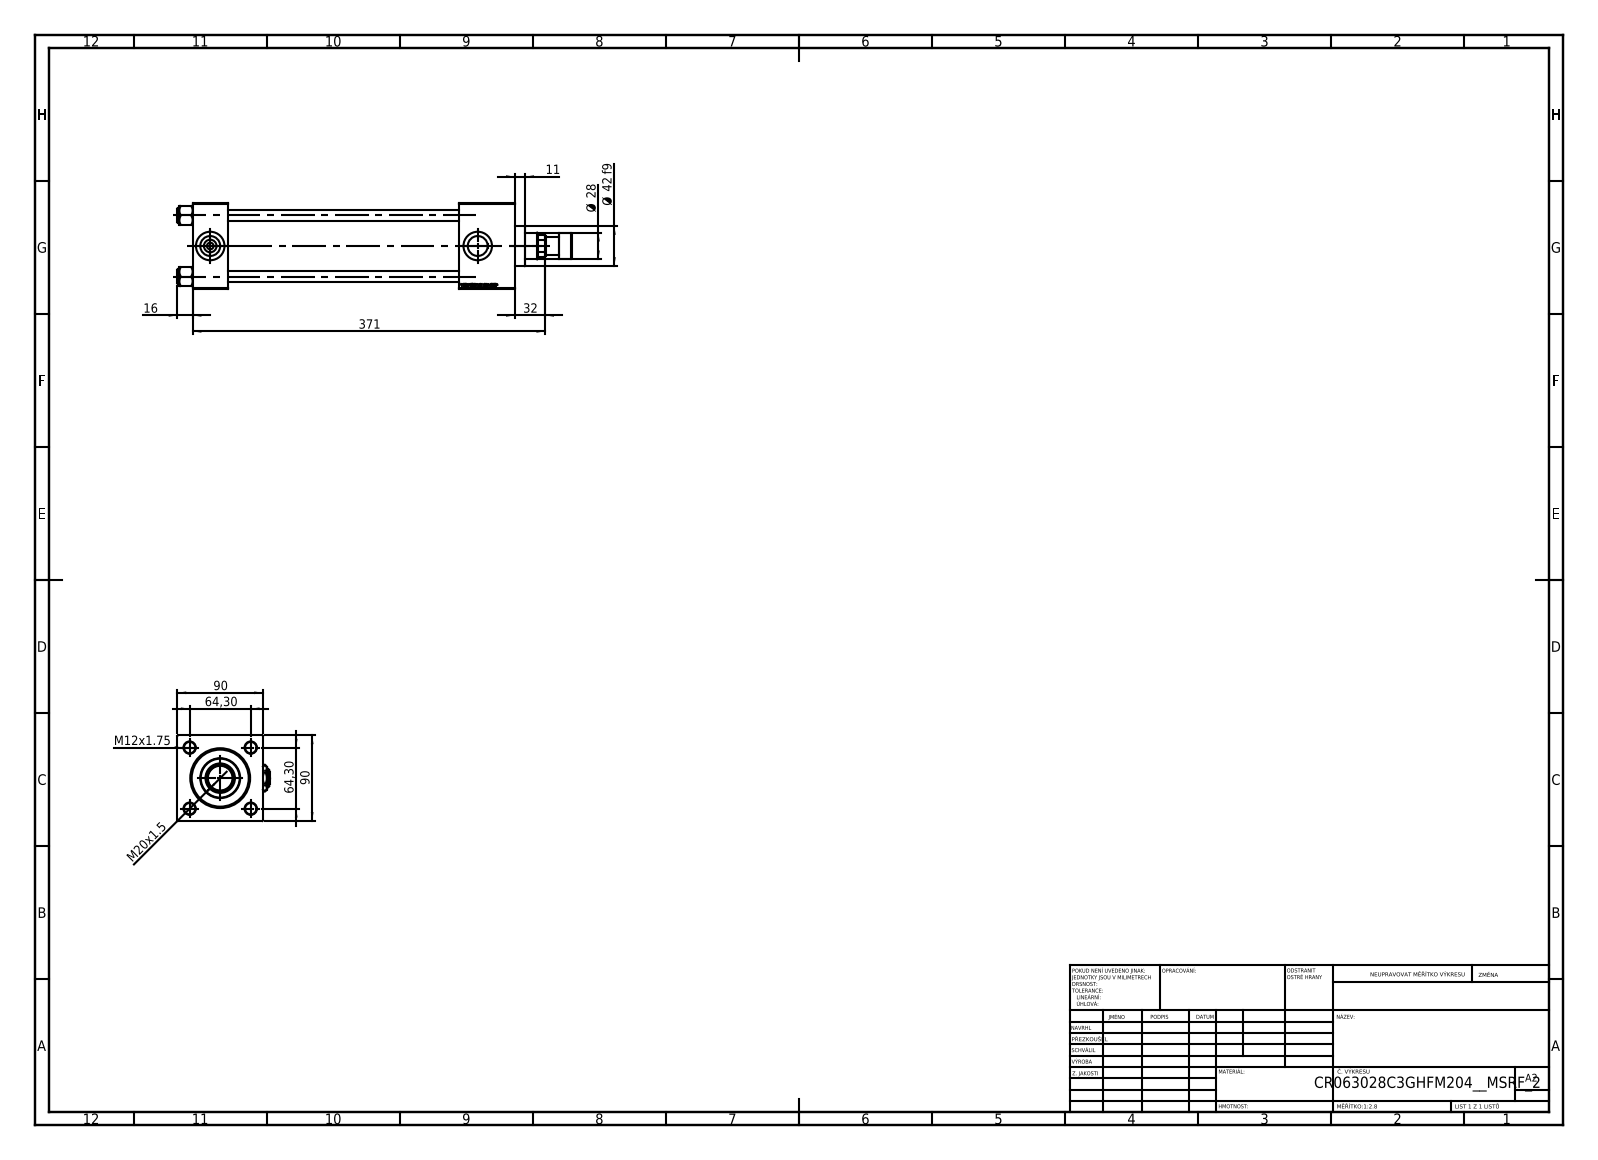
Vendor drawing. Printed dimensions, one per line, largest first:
371
90
90
64,30
64,30
Ø 42 f9
32
Ø 28
M20x1.5
16
M12x1.75
11
